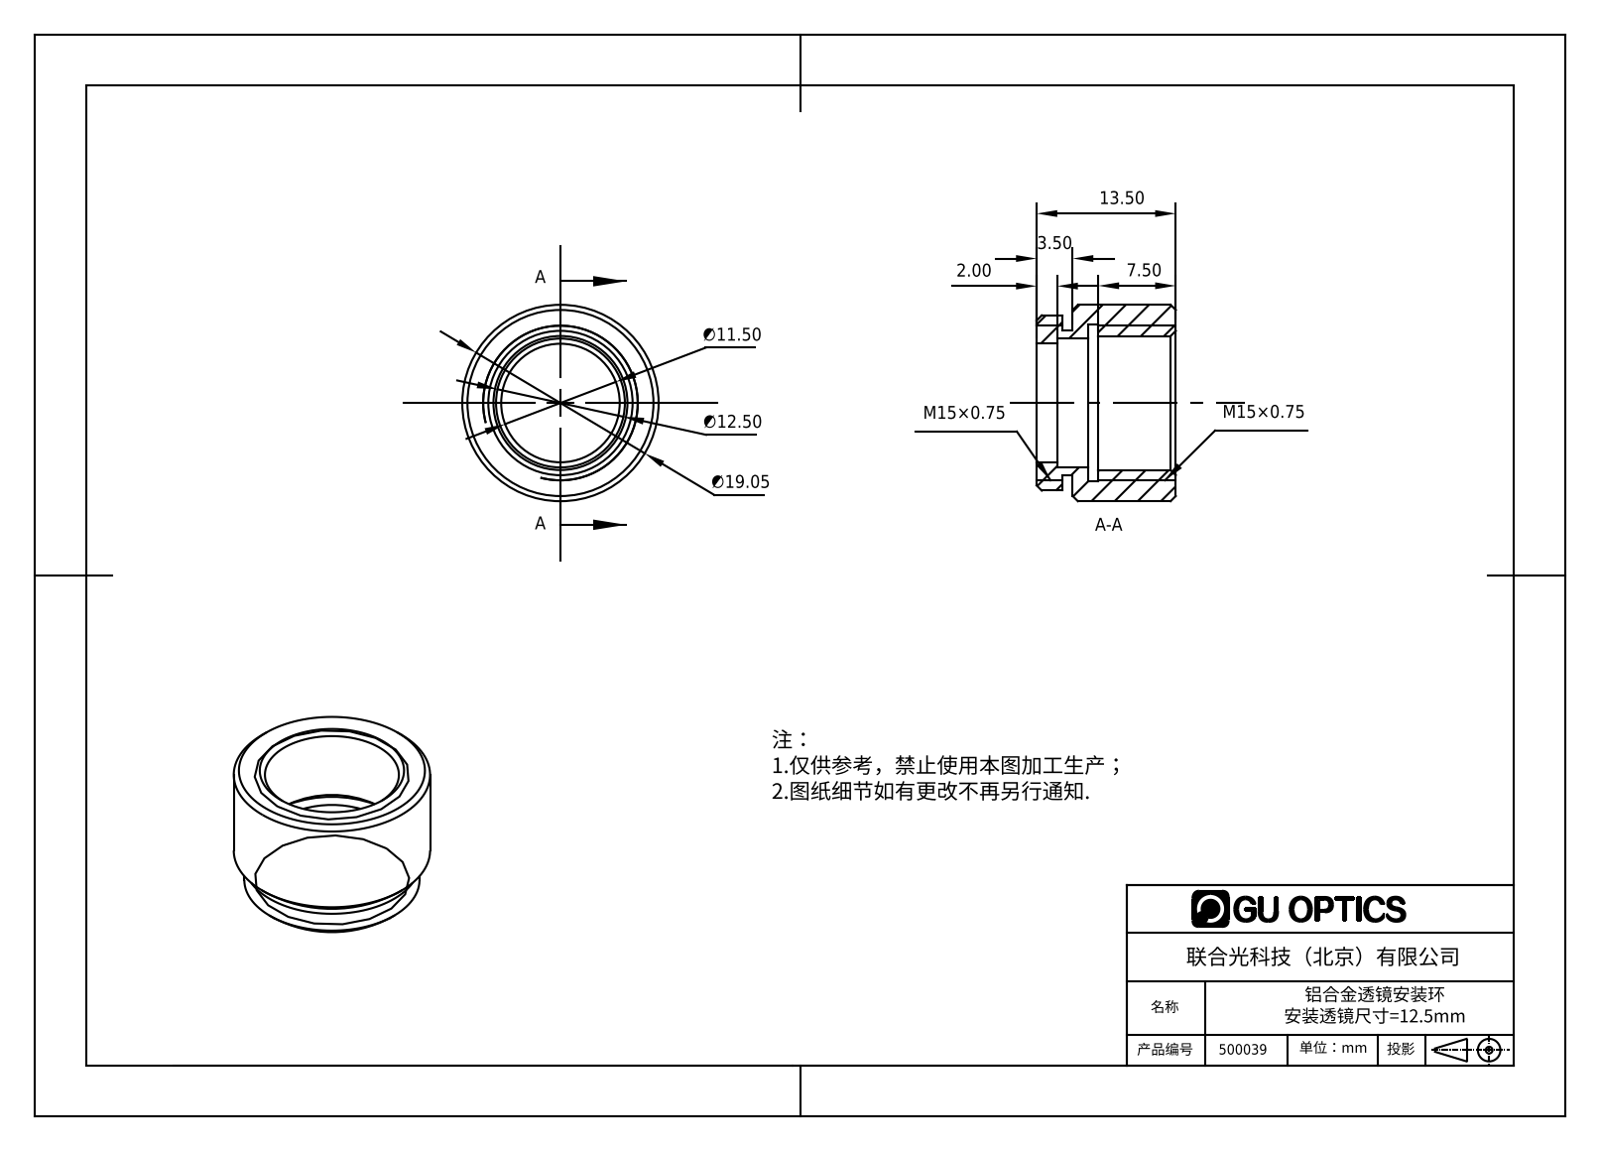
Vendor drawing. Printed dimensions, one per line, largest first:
∅19.05
13.50
∅12.50
∅11.50
7.50
3.50
2.00
